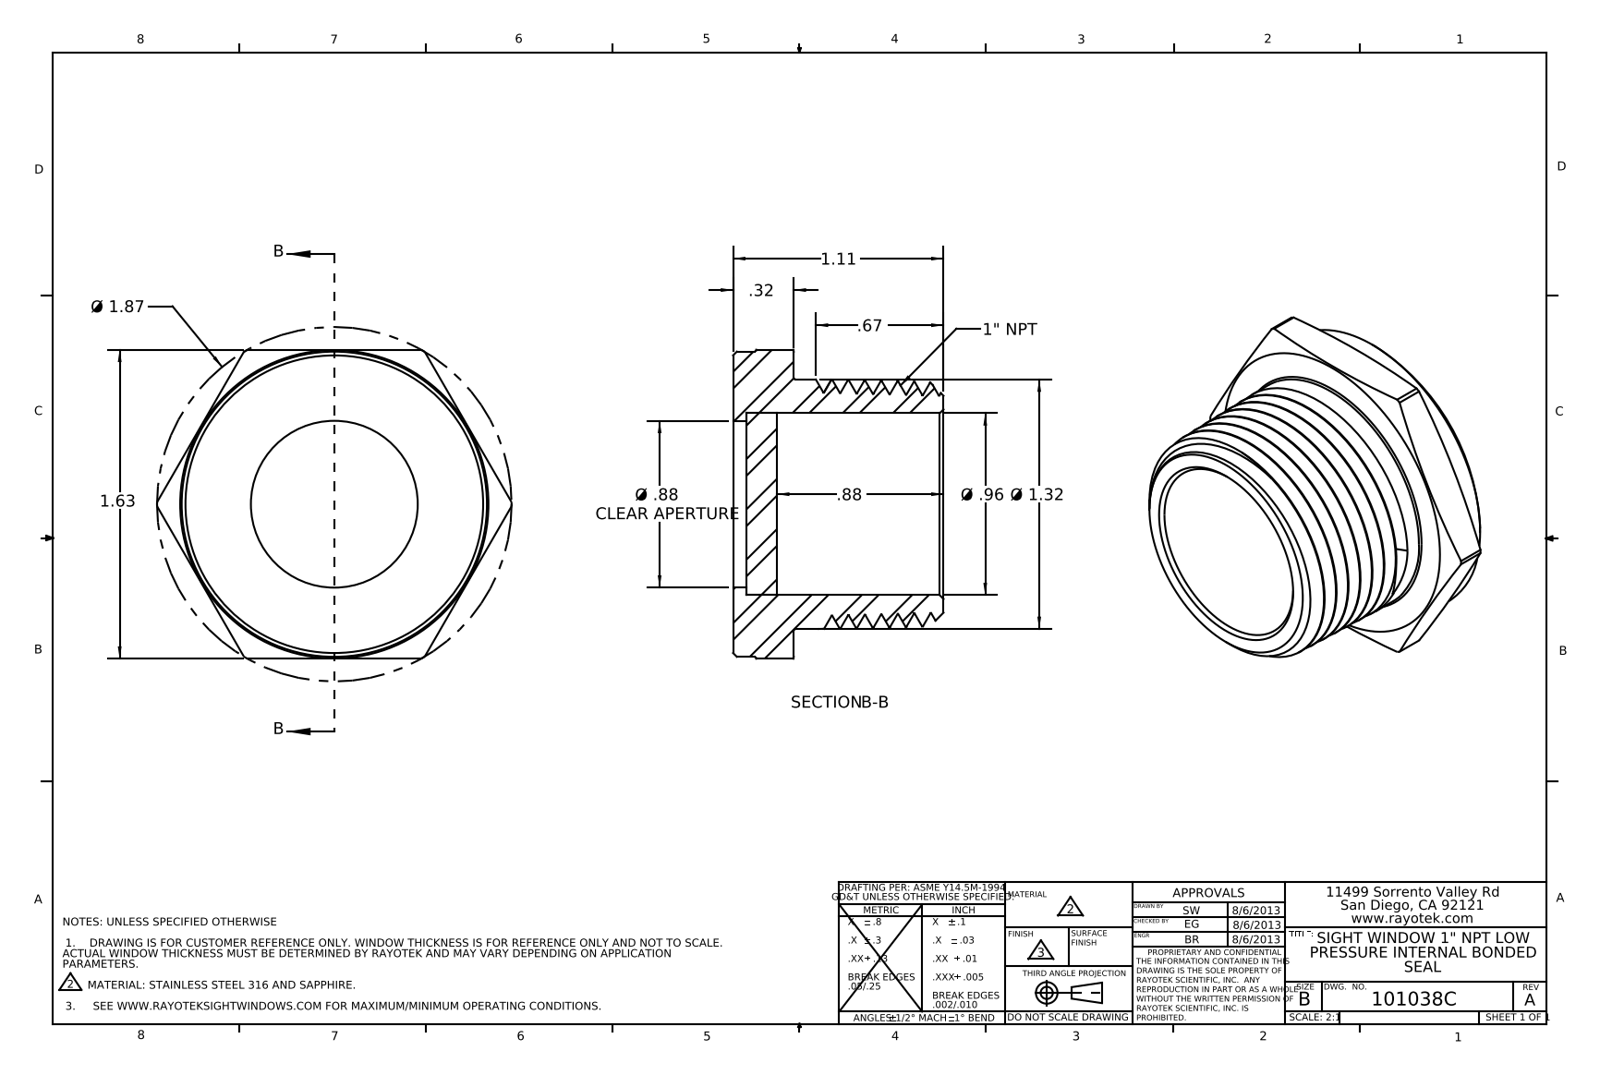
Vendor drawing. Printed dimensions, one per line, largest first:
Ø 1.87
1.63
Ø 1.32
1.11
Ø .96
.88
Ø .88 CLEAR APERTURE
.67
.32
